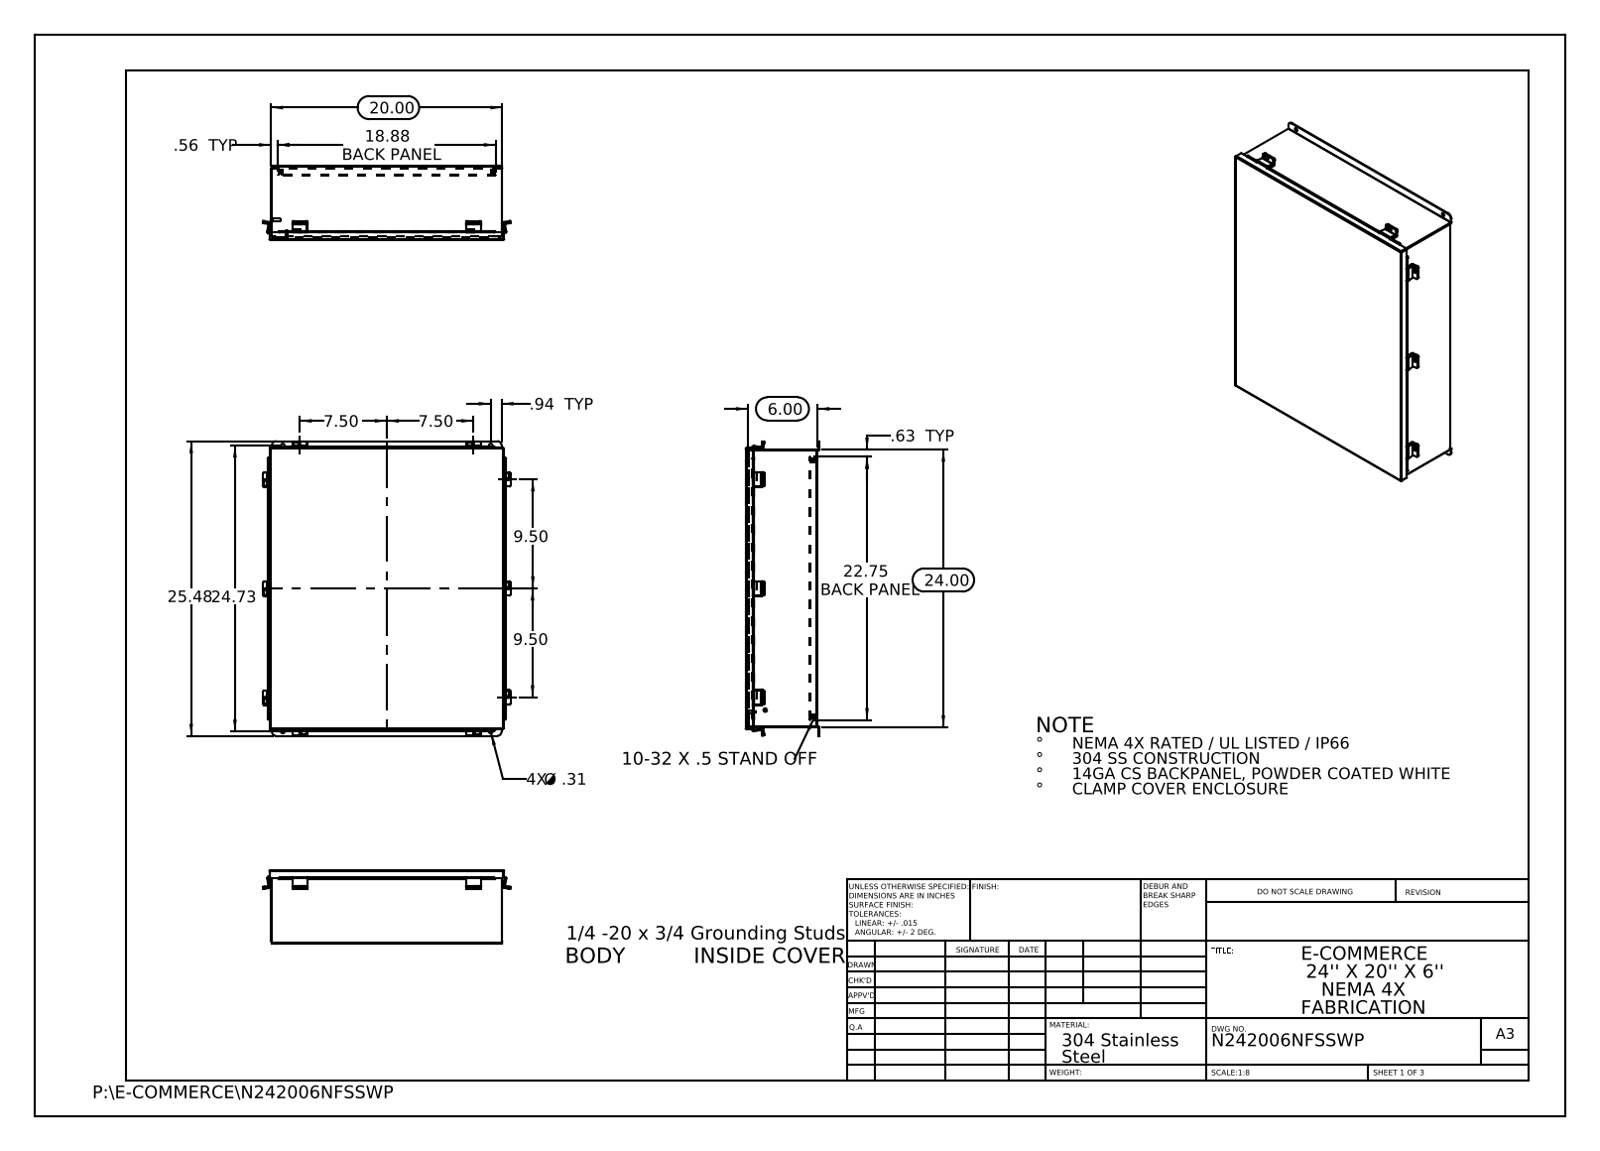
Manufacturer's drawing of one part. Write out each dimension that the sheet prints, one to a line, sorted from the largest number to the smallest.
25.48
24.73
24.00
22.75 BACK PANEL
20.00
18.88 BACK PANEL
9.50
9.50
7.50
7.50
6.00
.94 TYP
.63 TYP
.56 TYP
4X Ø .31
